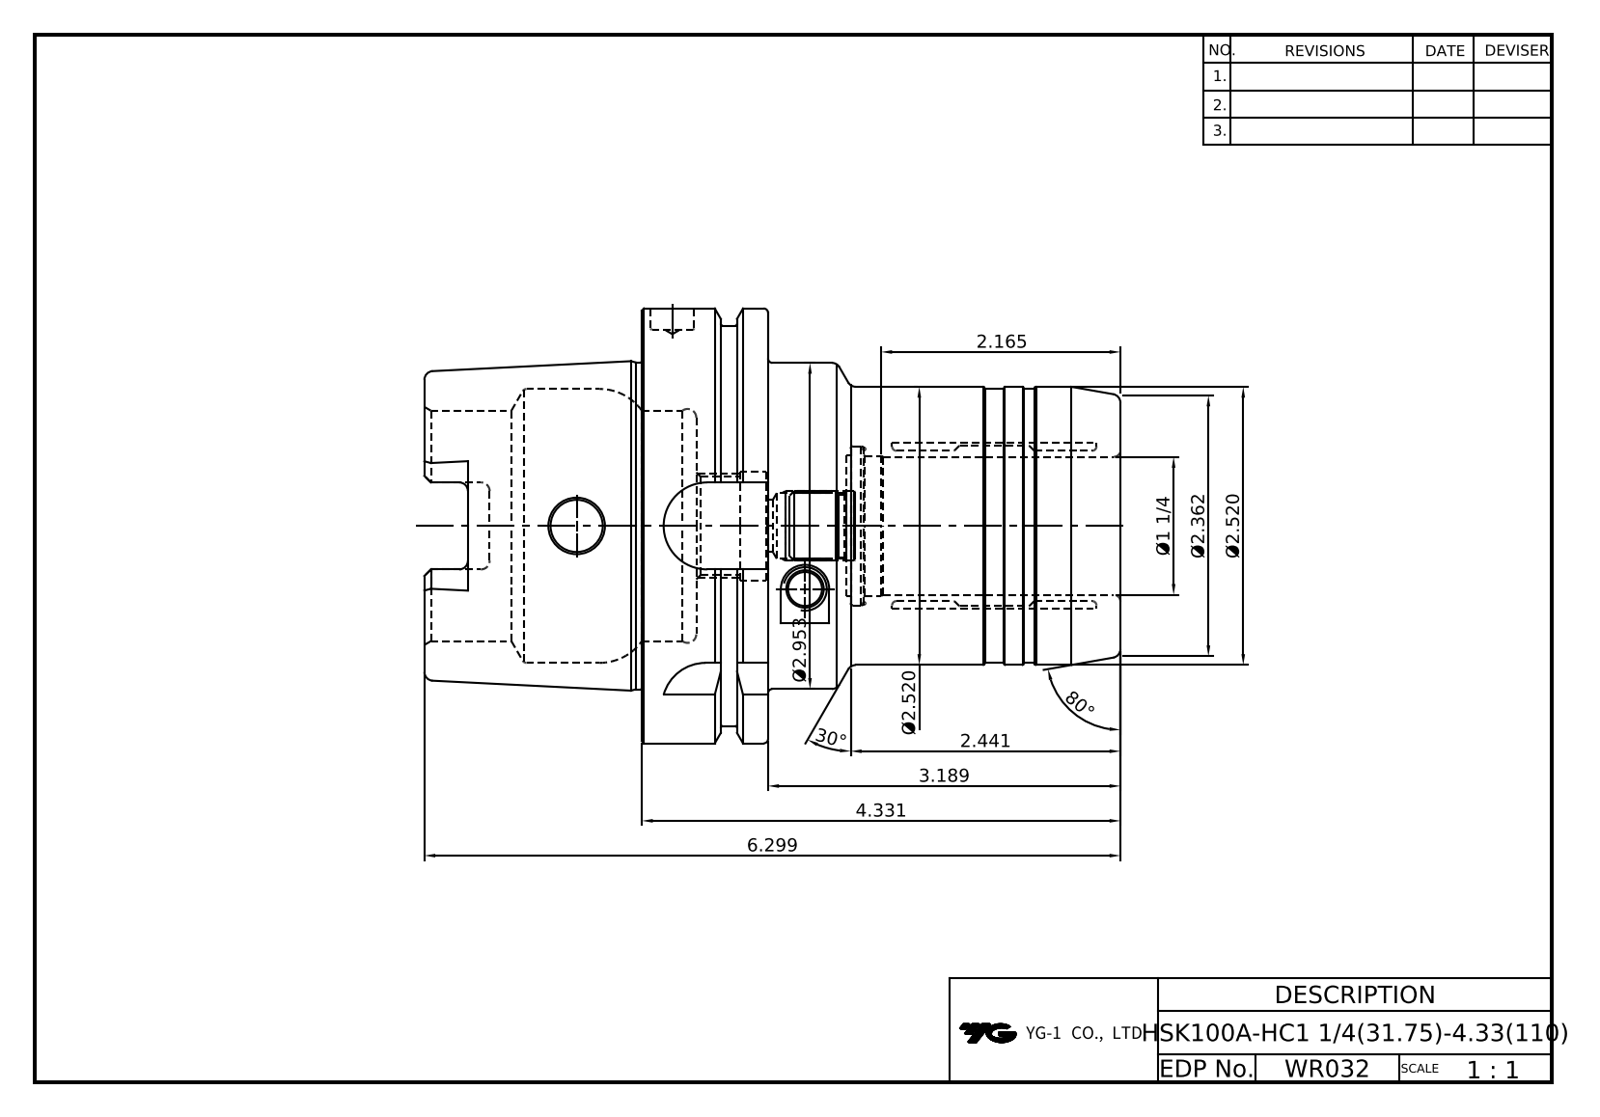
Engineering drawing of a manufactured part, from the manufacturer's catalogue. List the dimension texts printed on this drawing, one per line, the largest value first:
80°
30°
6.299
4.331
3.189
Ø2.953
Ø2.520
Ø2.520
2.441
Ø2.362
2.165
Ø1 1/4
